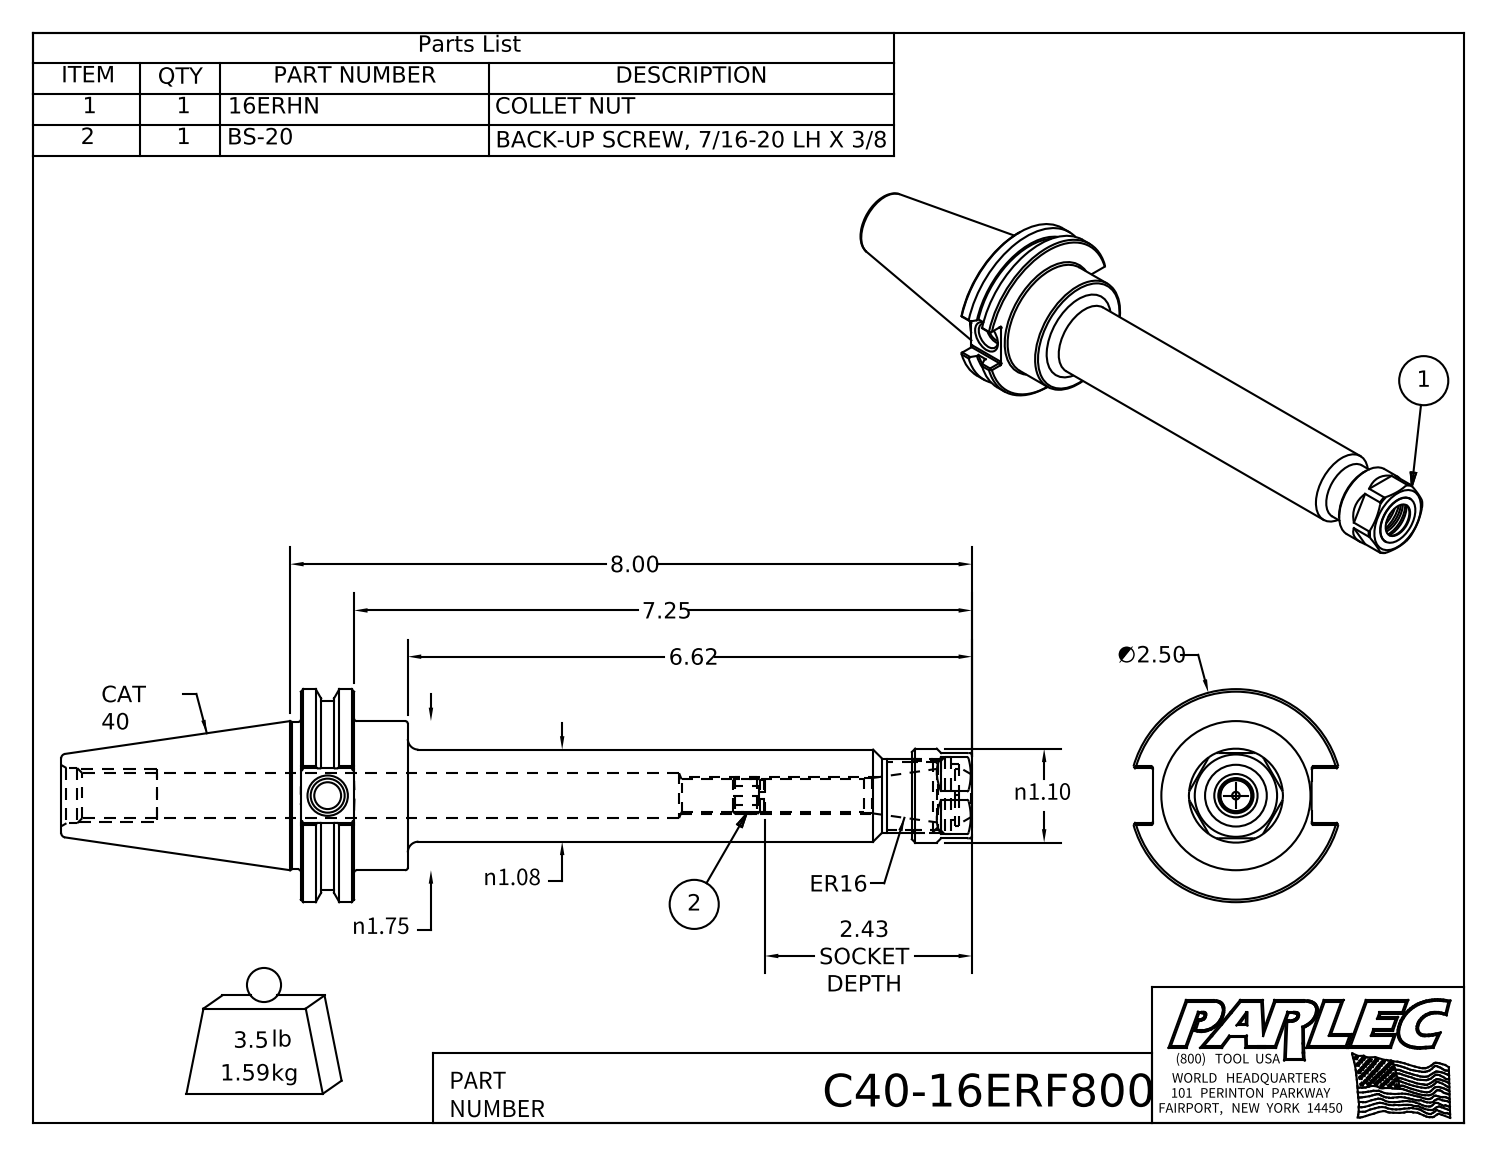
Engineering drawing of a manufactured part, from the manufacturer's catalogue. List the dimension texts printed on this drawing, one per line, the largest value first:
8.00
7.25
6.62
∅2.50
2.43 SOCKET DEPTH
n1.75
n1.10
n1.08
